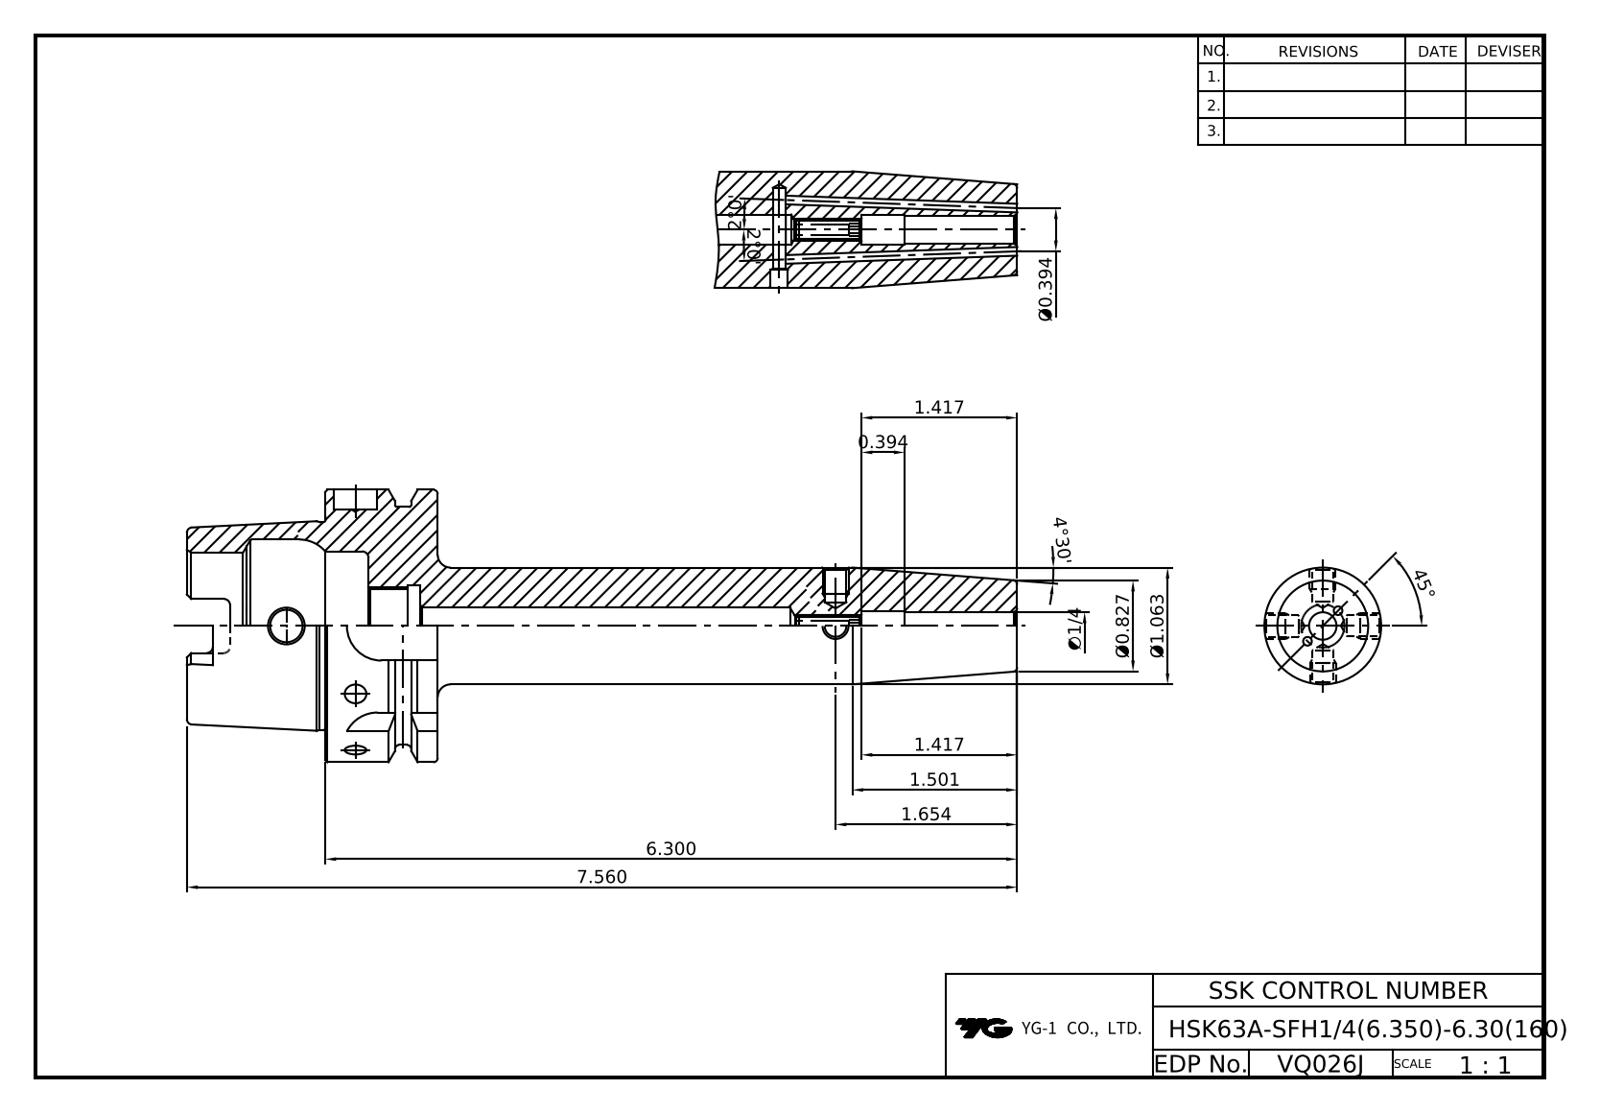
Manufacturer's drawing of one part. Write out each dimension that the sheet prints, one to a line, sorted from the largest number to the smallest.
45°
7.560
6.300
4°30'
1.654
1.501
1.417
1.417
Ø1.063
Ø0.827
0.394
Ø0.394
